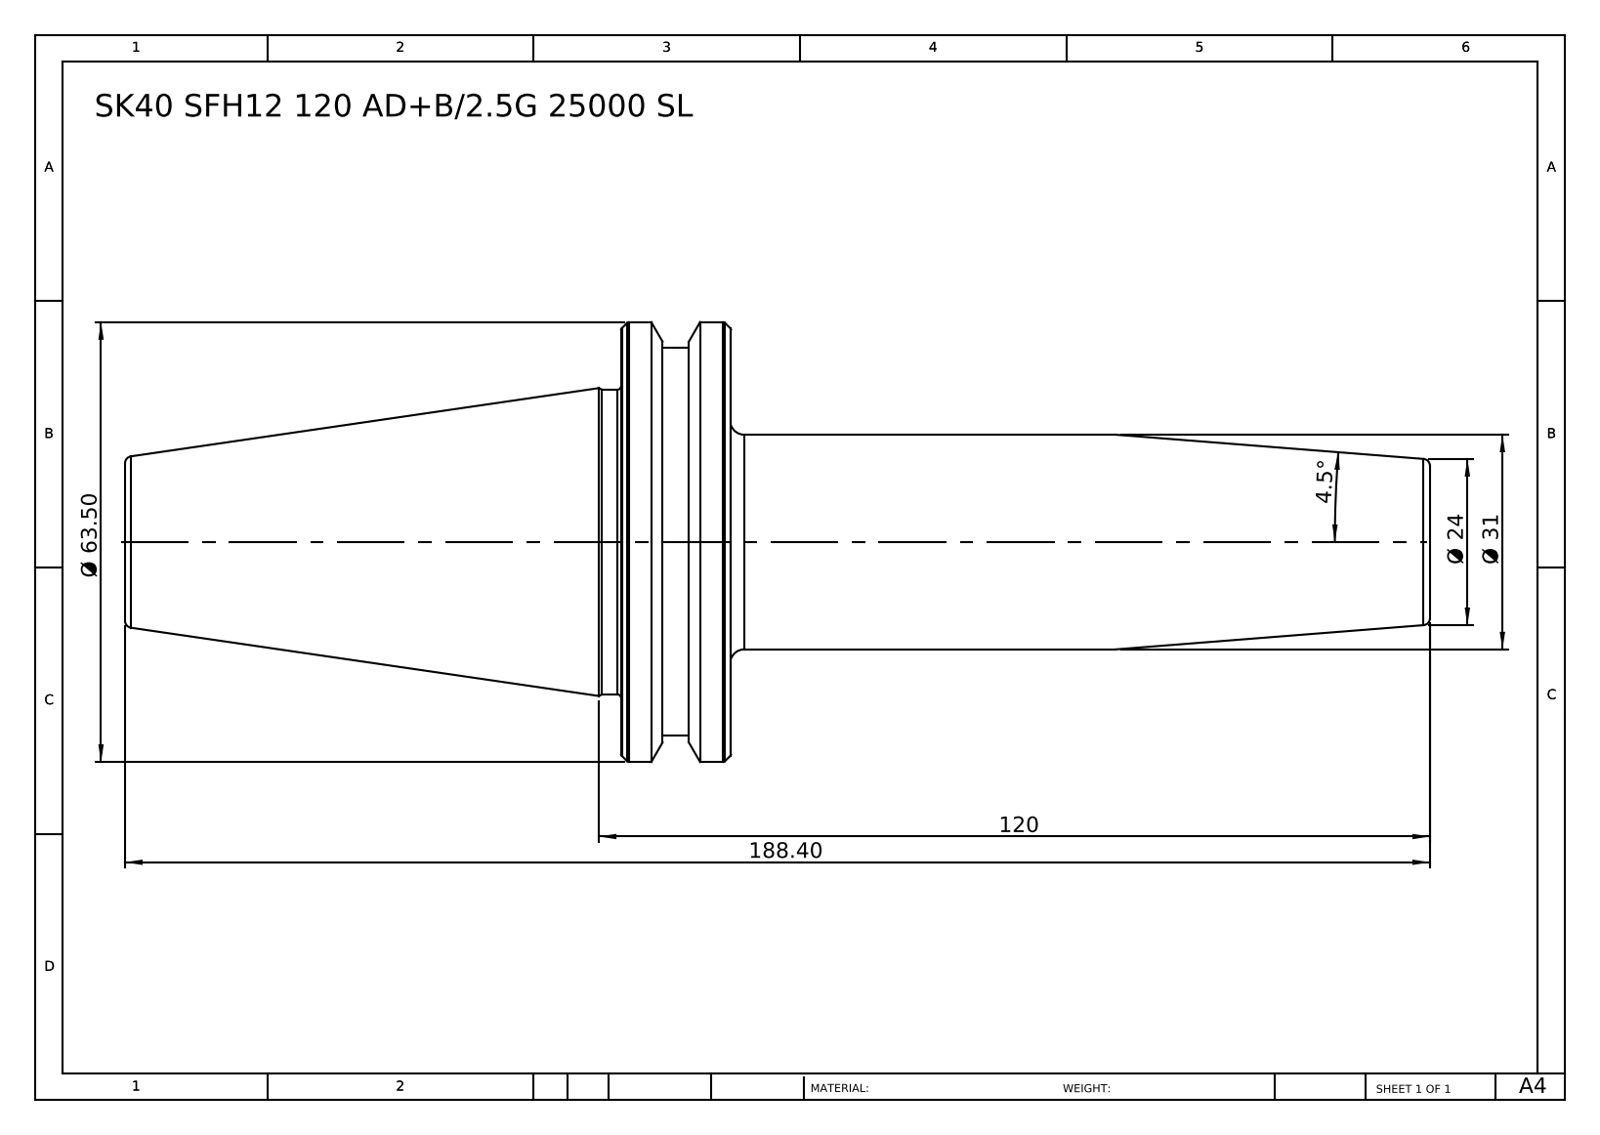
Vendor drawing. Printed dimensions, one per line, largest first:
188.40
120
Ø 63.50
Ø 31
Ø 24
4.5°
